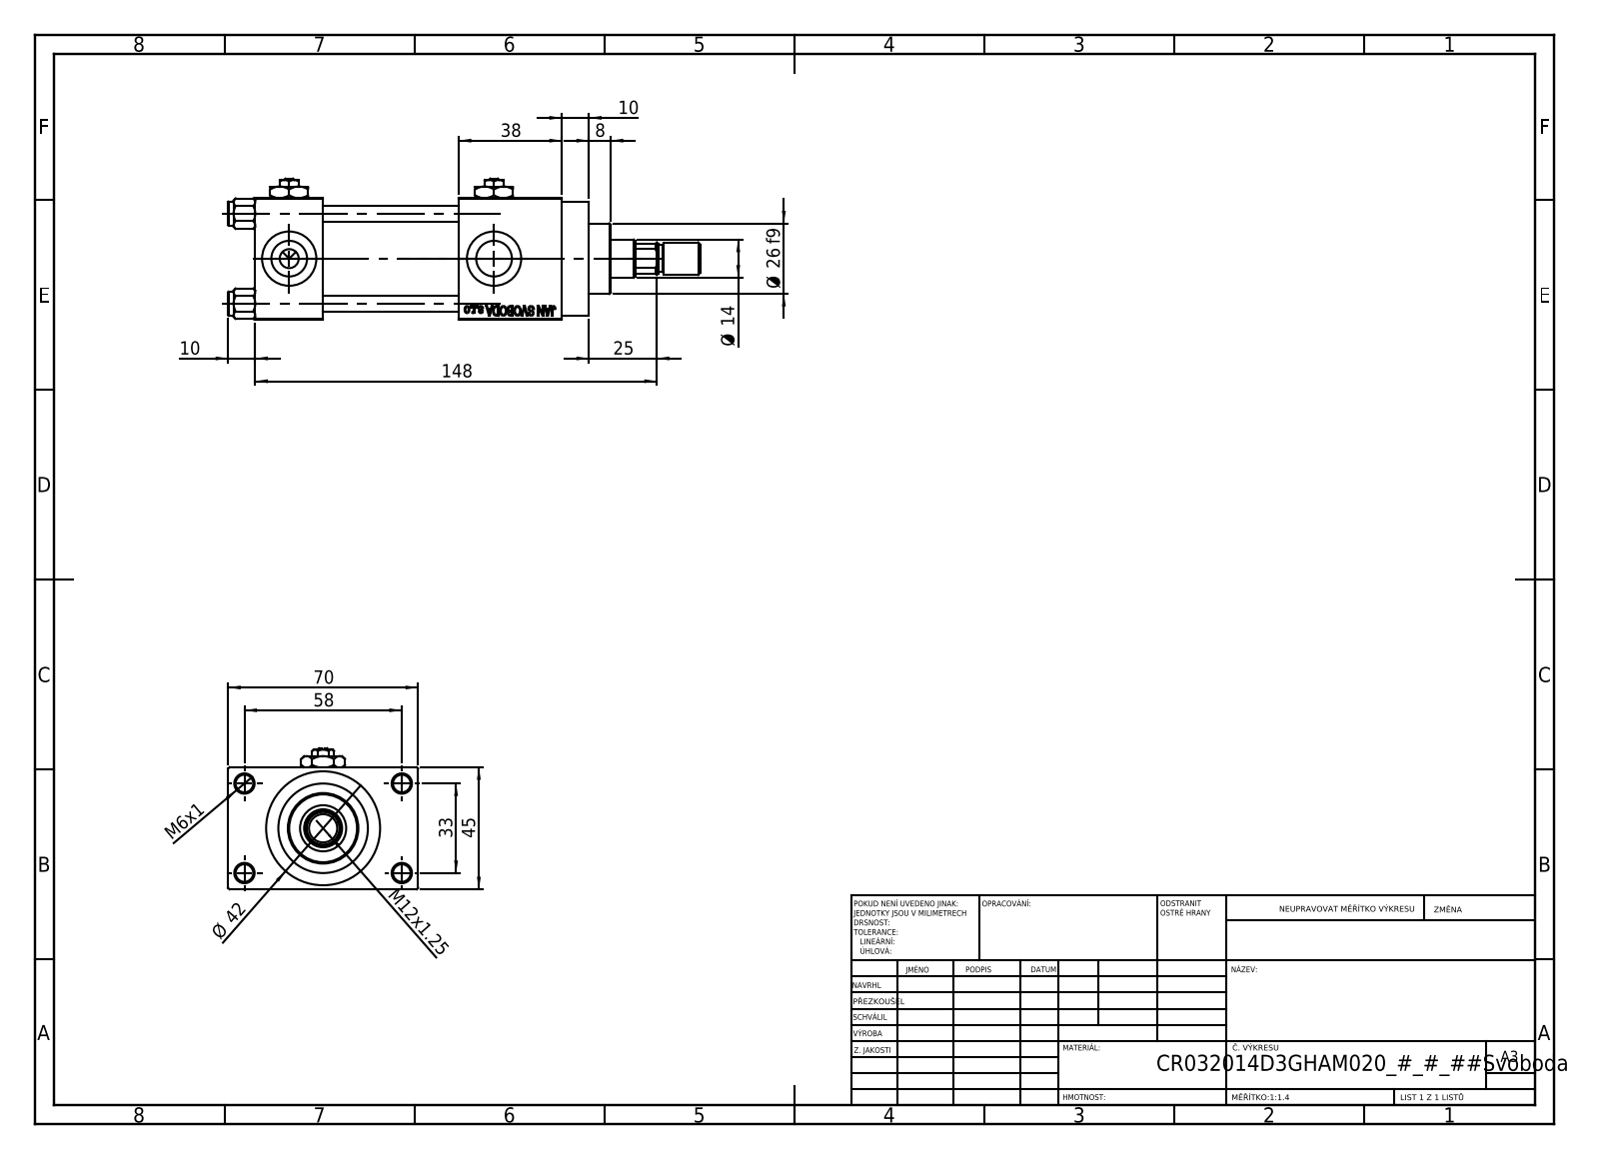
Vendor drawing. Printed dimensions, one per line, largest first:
148
70
58
45
Ø 42
38
33
Ø 26 f9
25
Ø 14
M12x1.25
10
10
8
M6x1
